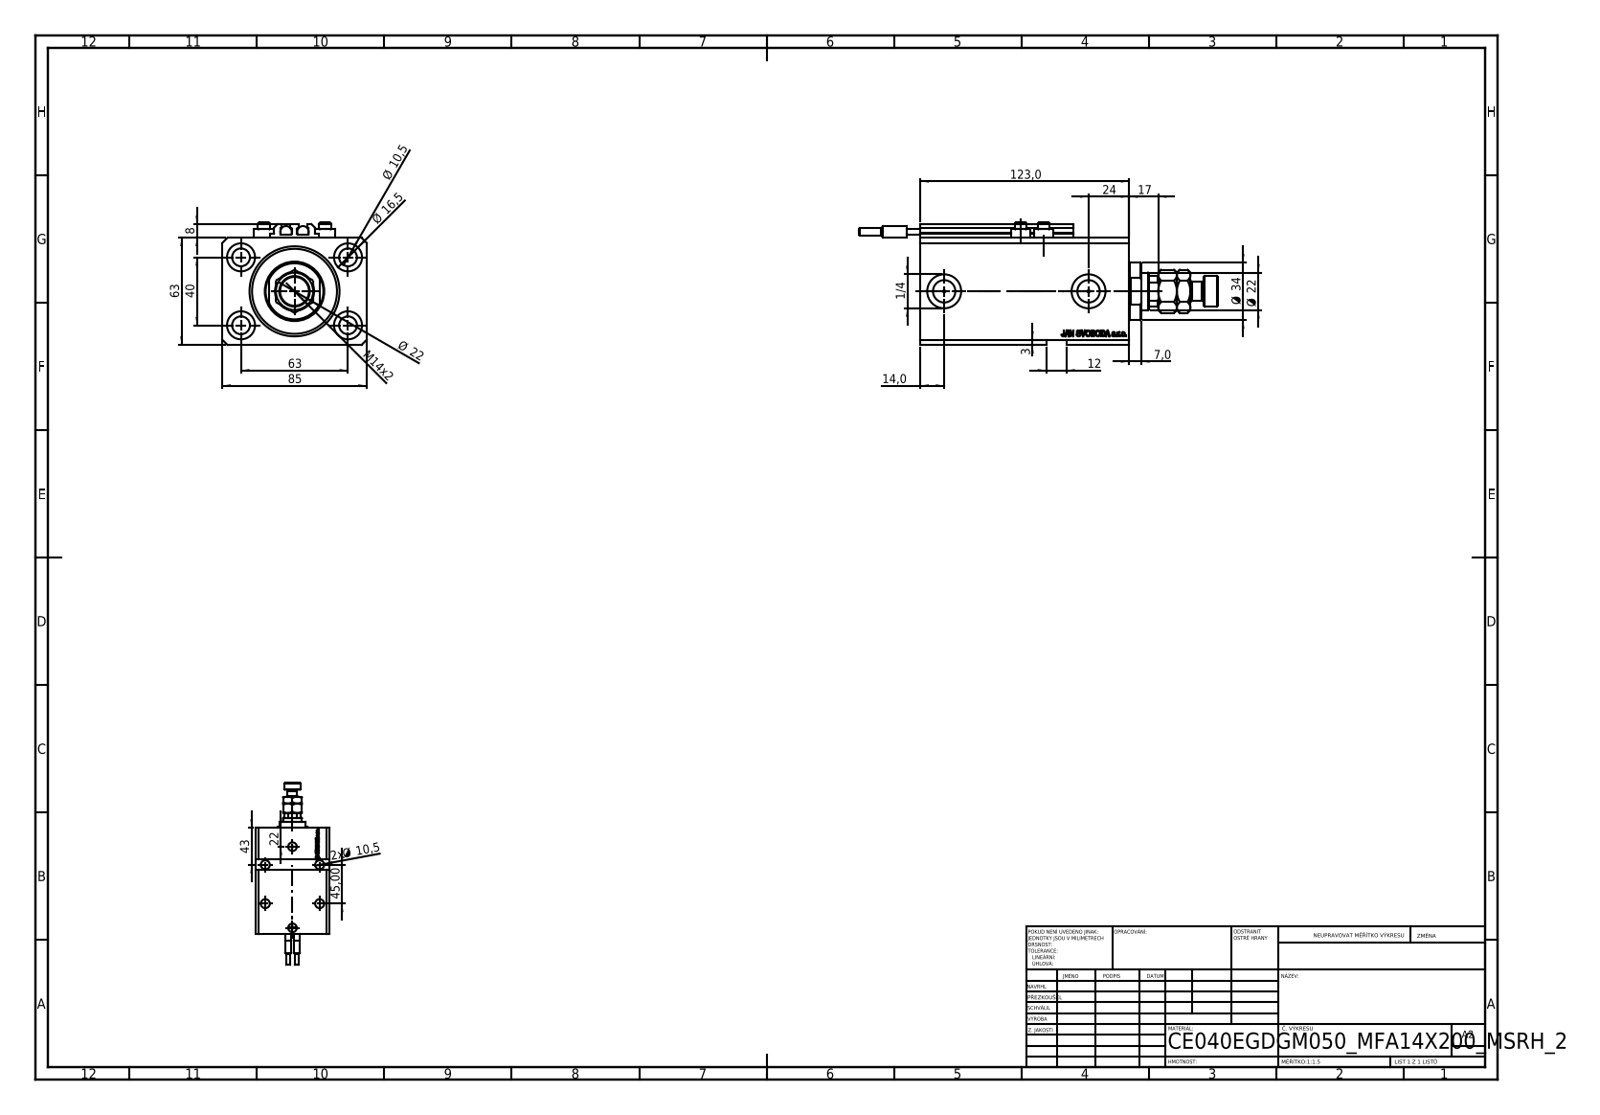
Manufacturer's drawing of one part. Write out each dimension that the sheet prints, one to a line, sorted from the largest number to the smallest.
123,0
85
63
63
45,00
43
40
Ø 34
24
Ø 22
Ø 22
22
17
Ø 16,5
M14x2
14,0
12
Ø 10,5
2x Ø 10,5
8
7,0
3
1/4
